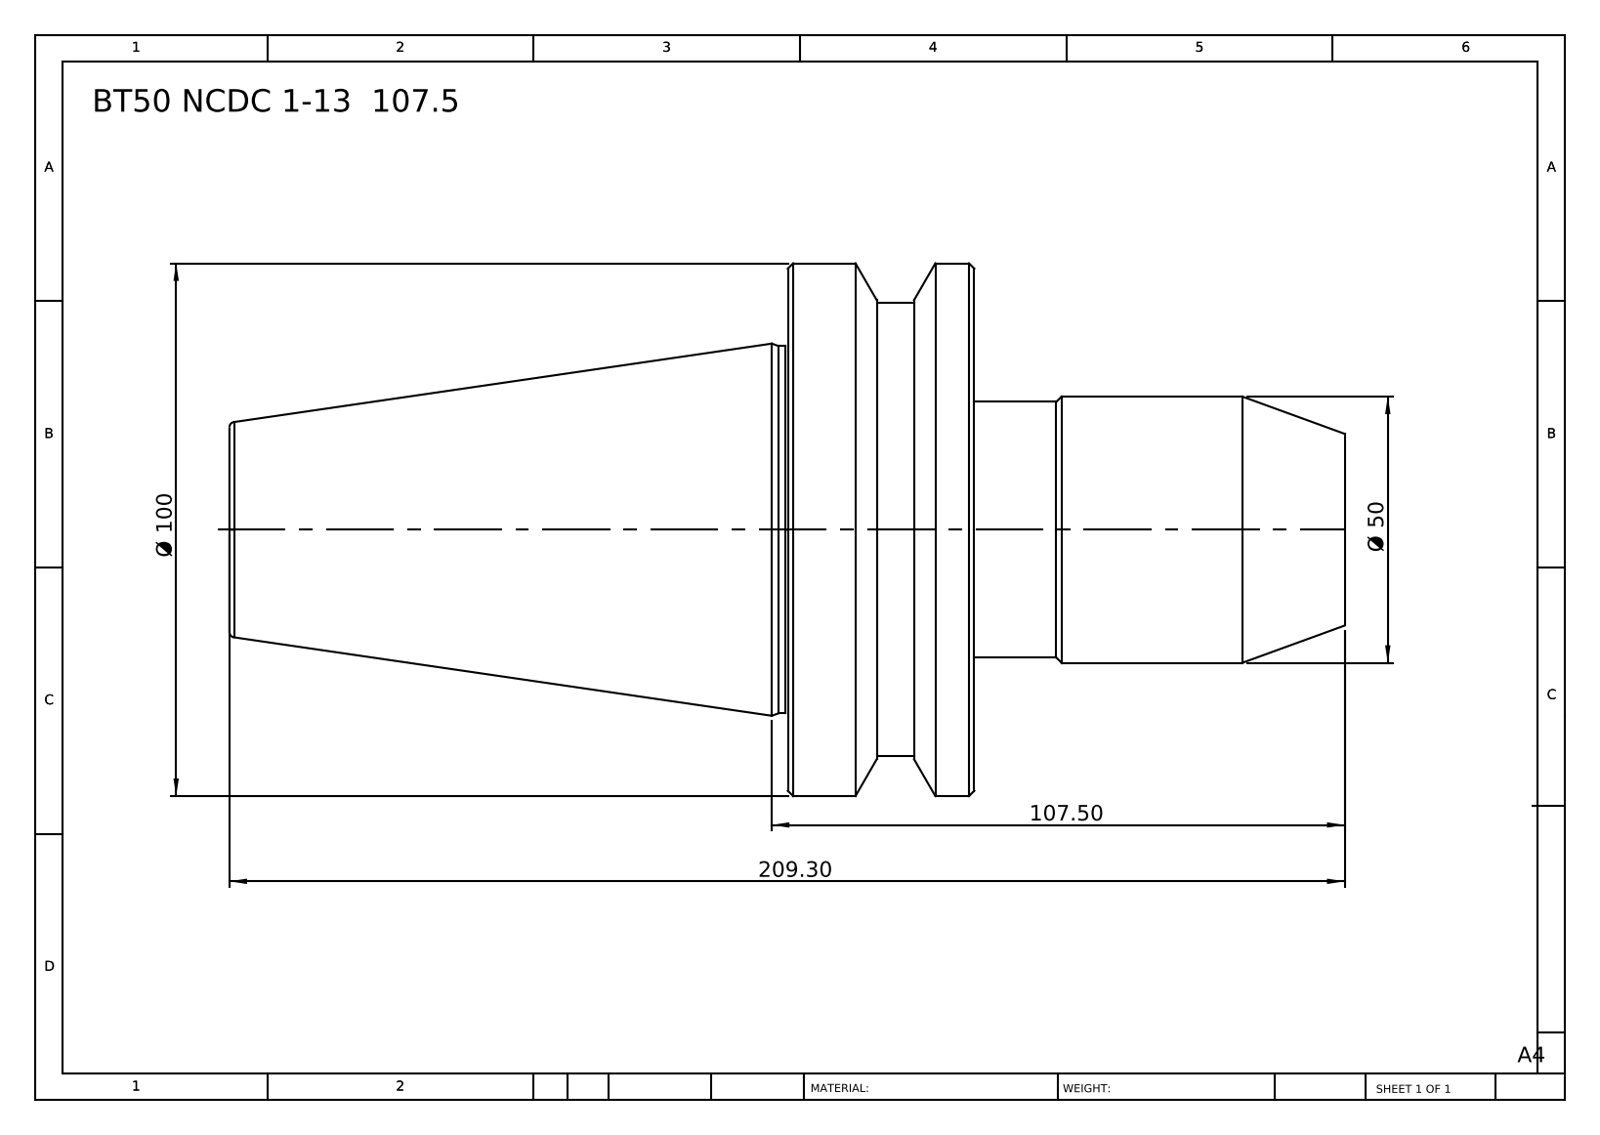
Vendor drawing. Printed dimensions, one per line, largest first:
209.30
107.50
Ø 100
Ø 50
